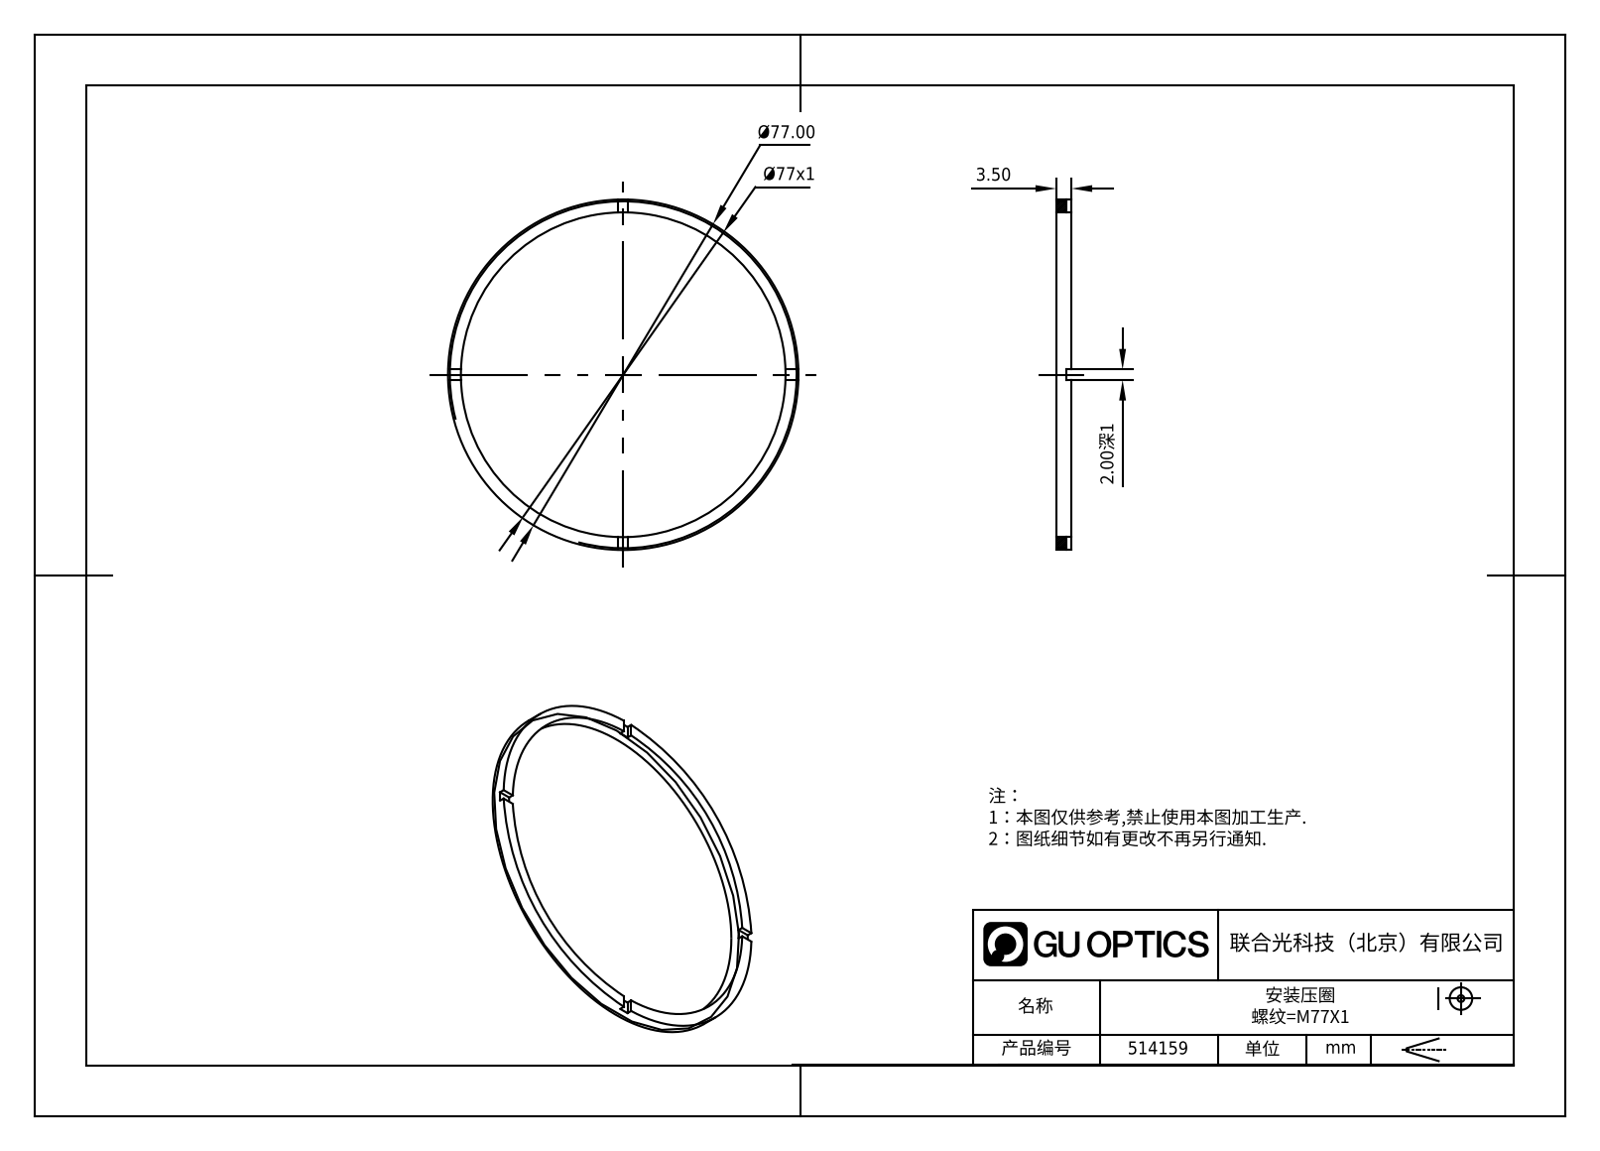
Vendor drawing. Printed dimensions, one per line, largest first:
Ø77.00
Ø77x1
3.50
2.00深1
